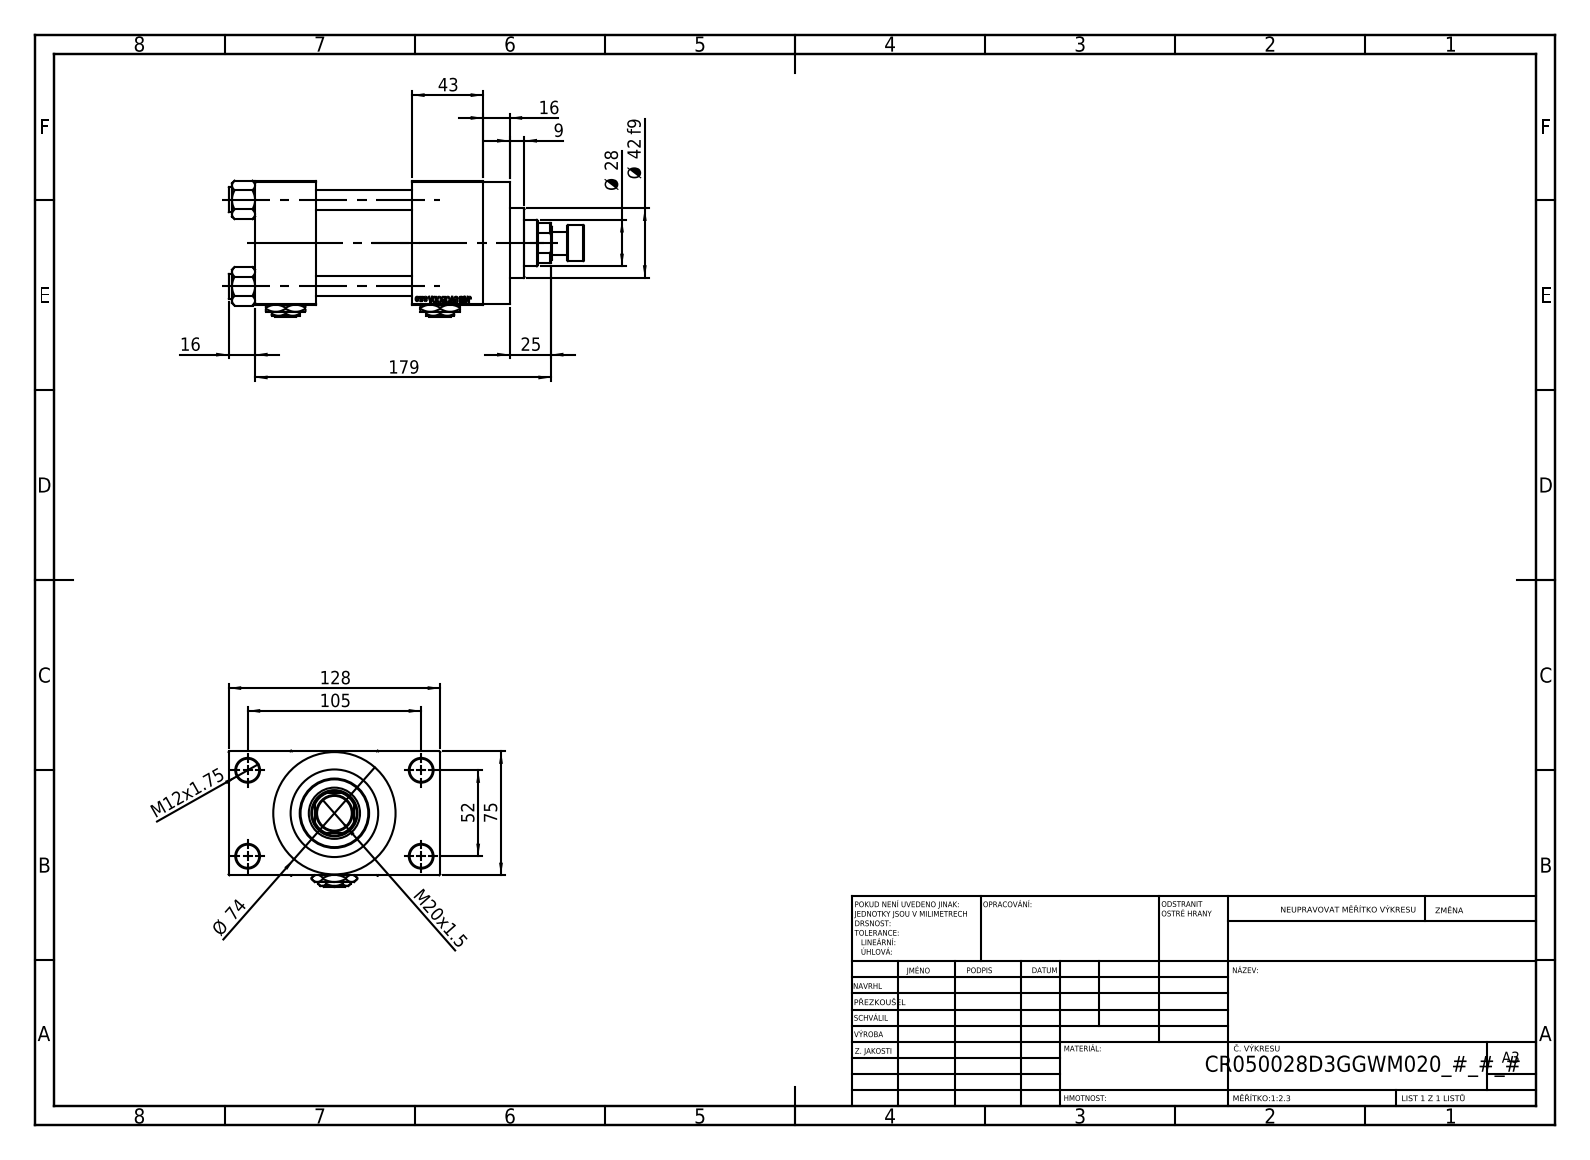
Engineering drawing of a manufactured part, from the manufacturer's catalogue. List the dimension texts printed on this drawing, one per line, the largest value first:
179
128
105
75
Ø 74
52
43
Ø 42 f9
Ø 28
25
M20x1.5
16
16
M12x1.75
9
